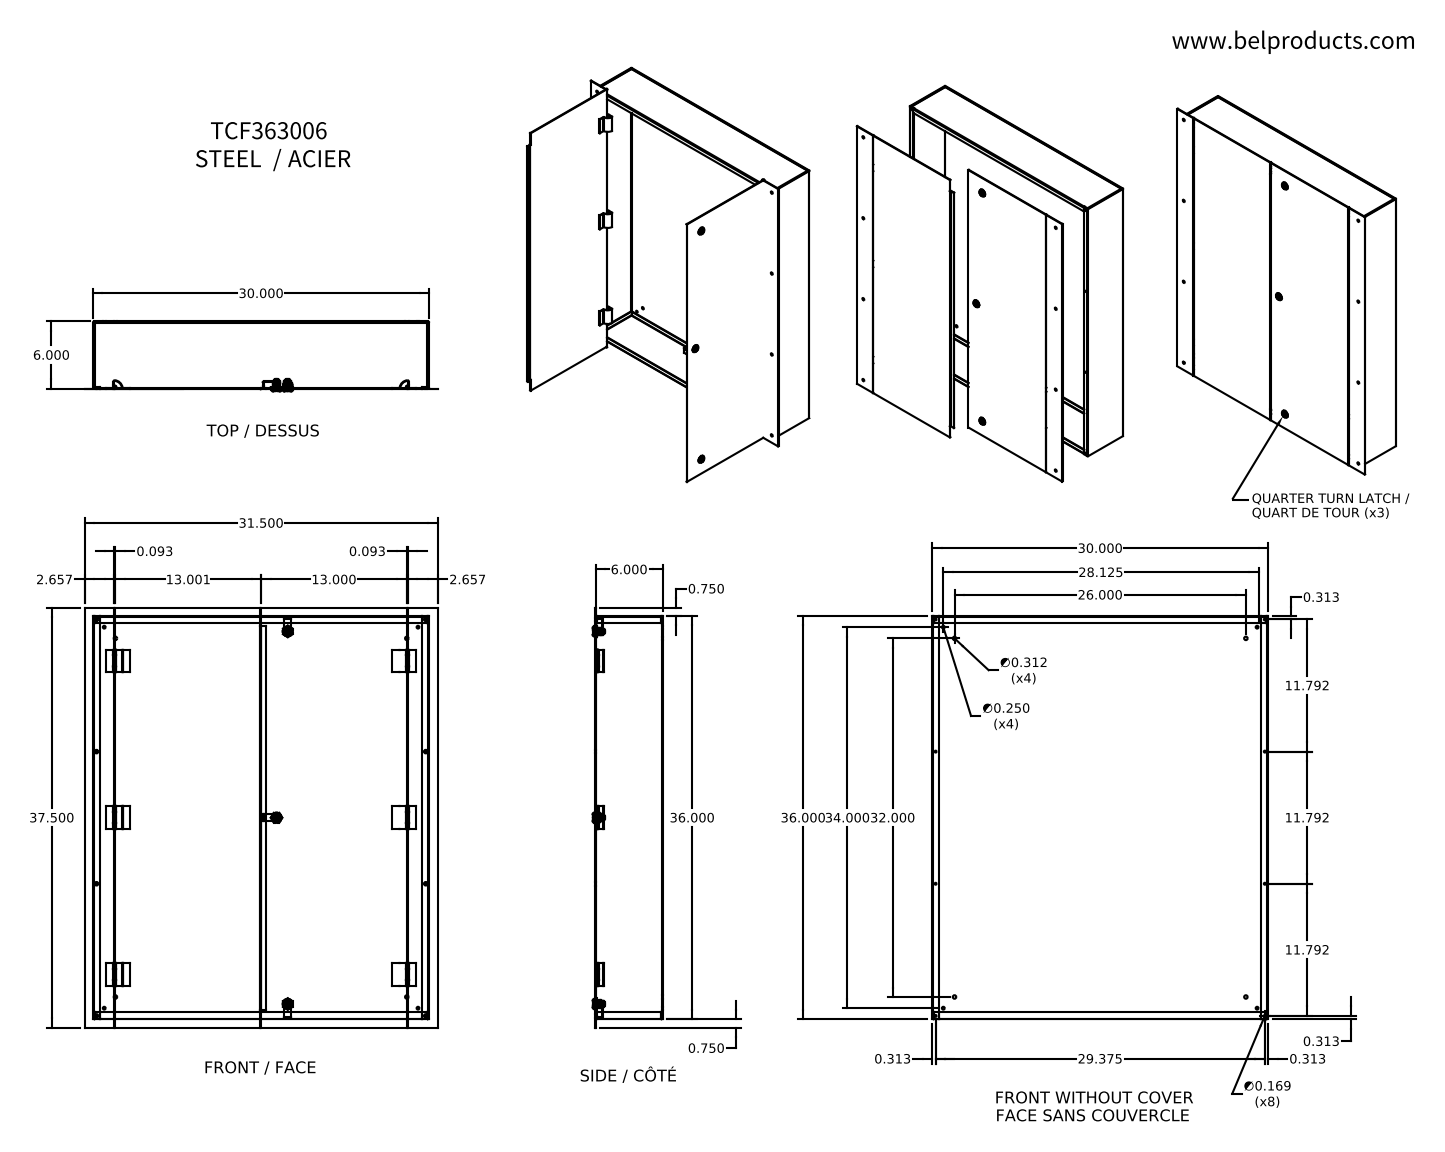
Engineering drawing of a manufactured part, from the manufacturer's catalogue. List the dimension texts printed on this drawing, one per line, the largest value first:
37.500
36.000
36.000
34.000
32.000
31.500
30.000
30.000
29.375
28.125
26.000
13.001
13.000
11.792
11.792
11.792
6.000
6.000
2.657
2.657
0.750
0.750
0.313
0.313
0.313
0.313
∅0.312 (x4)
∅0.250 (x4)
∅0.169 (x8)
0.093
0.093
